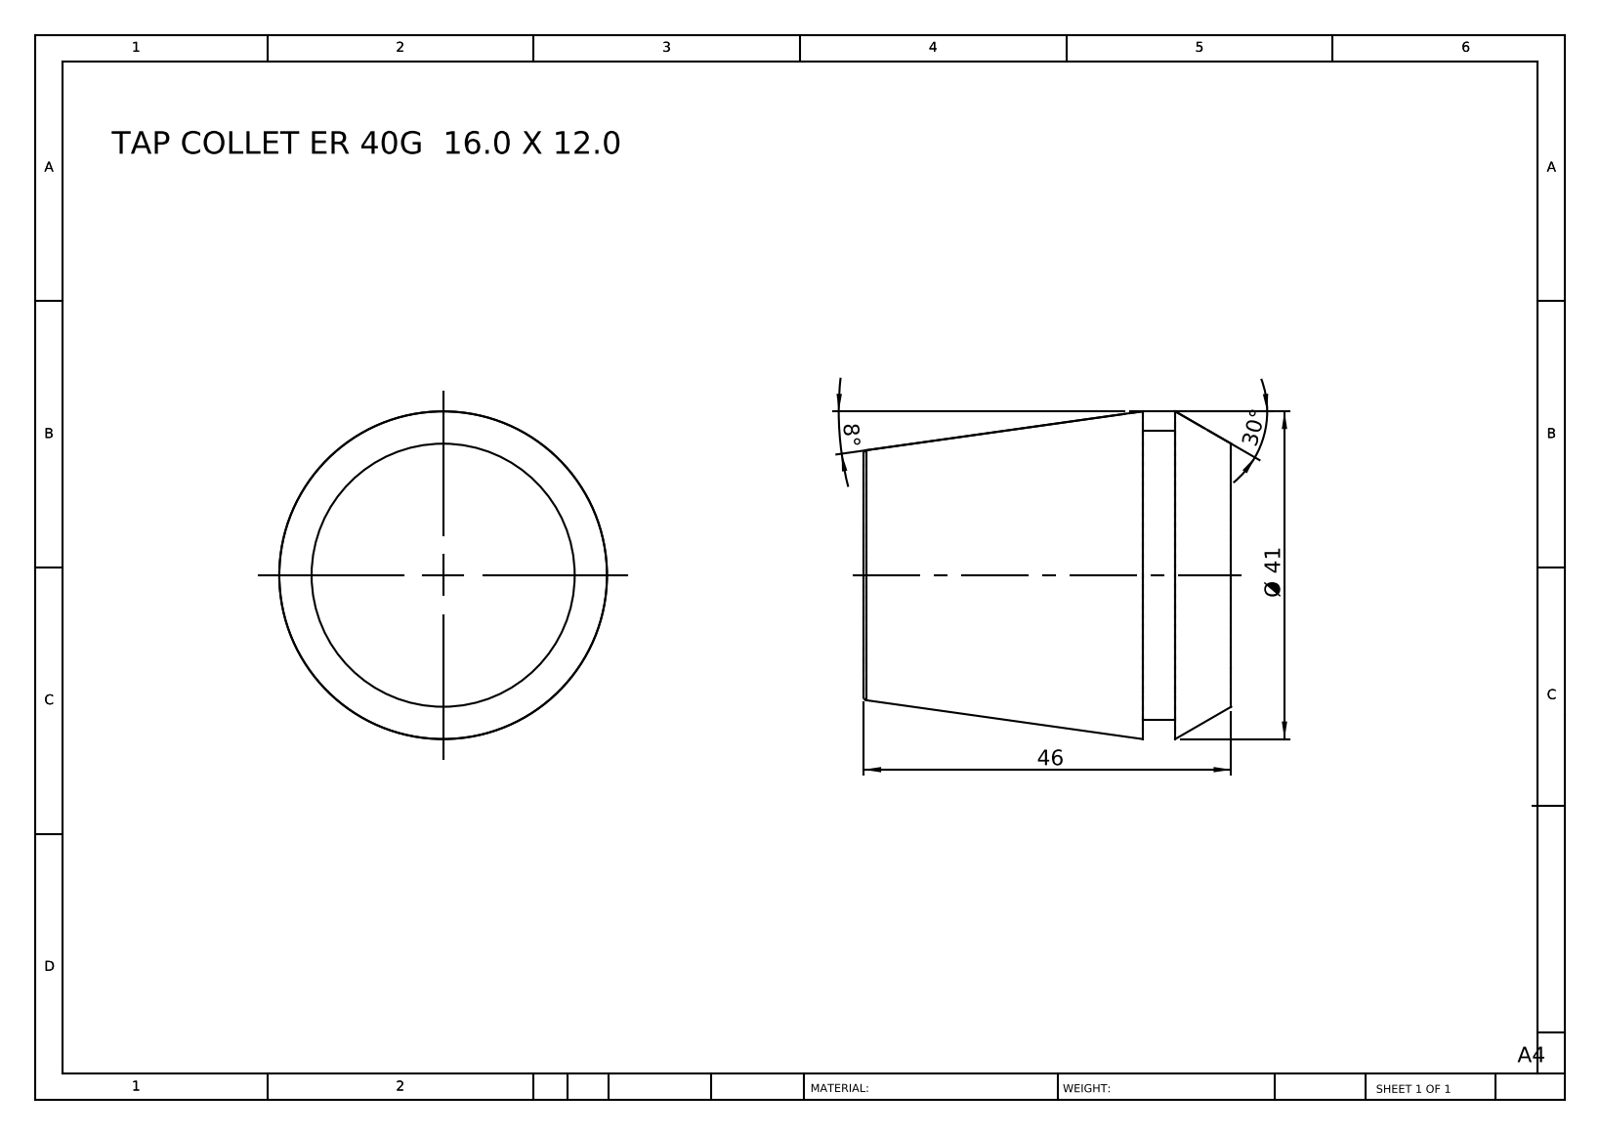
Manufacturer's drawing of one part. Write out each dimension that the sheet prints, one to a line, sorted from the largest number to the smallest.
46
Ø 41
30°
8°
